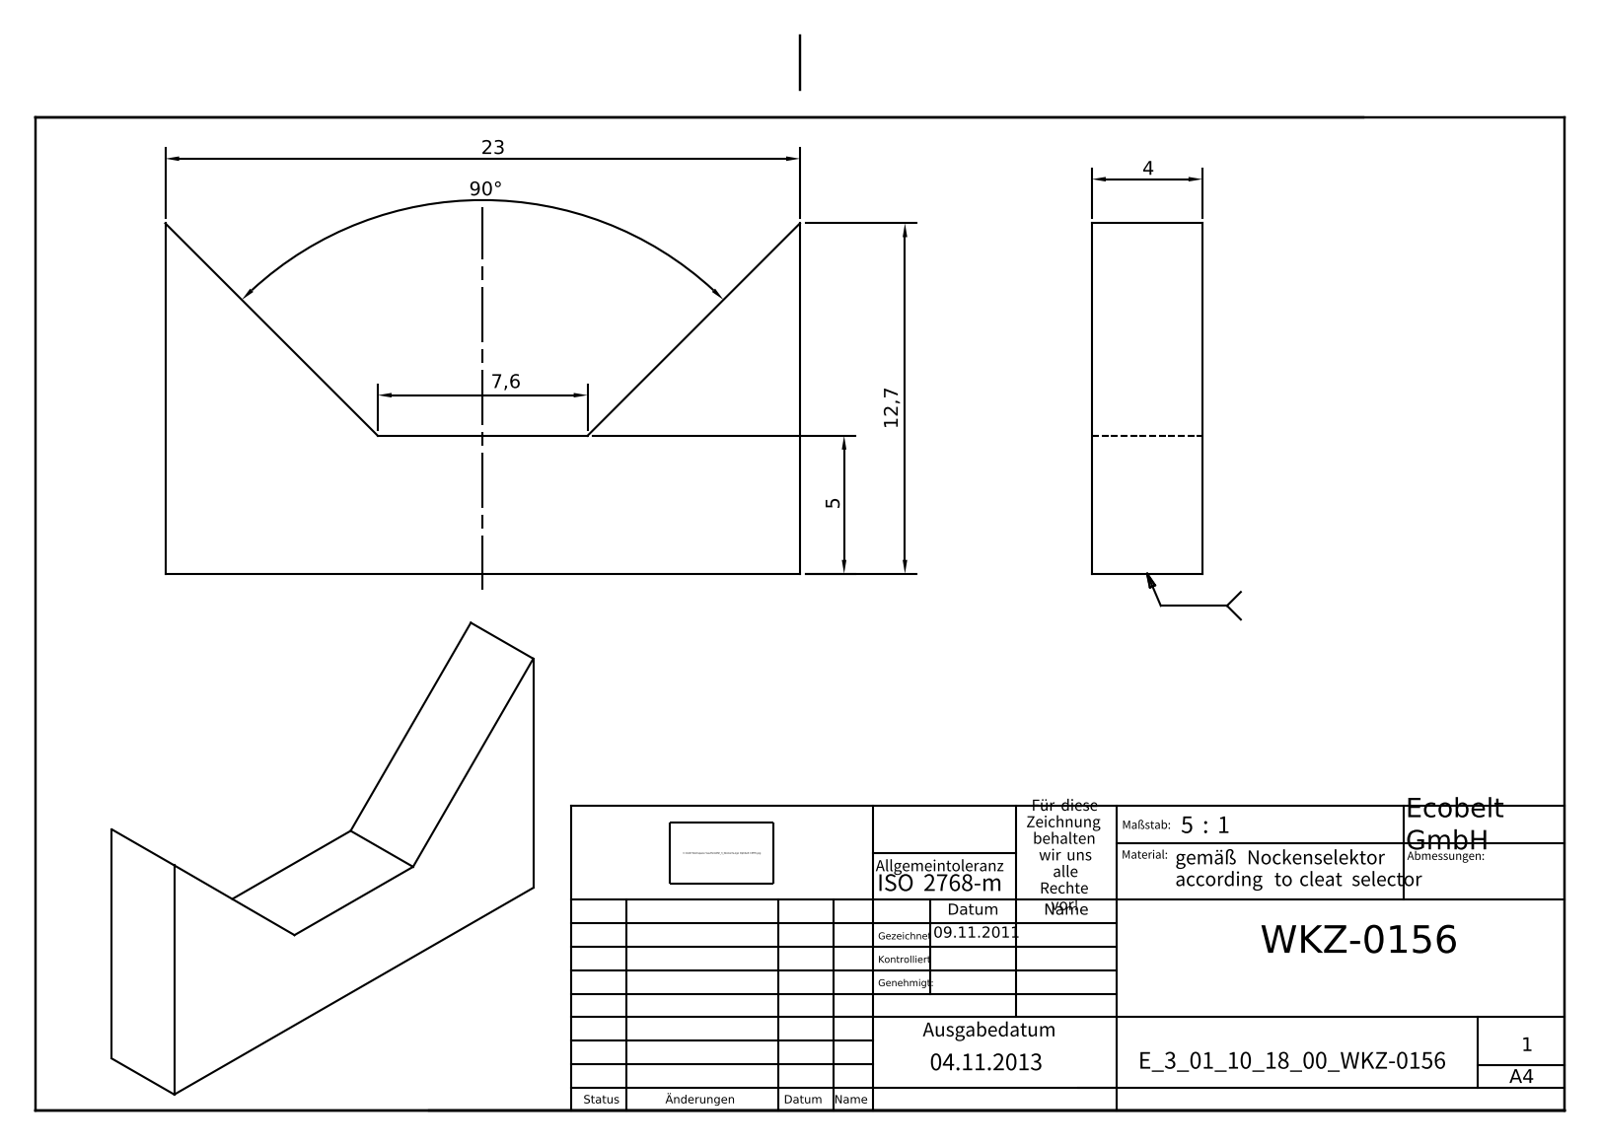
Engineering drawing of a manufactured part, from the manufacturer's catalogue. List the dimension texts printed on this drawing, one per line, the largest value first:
90°
23
12,7
7,6
5
4
